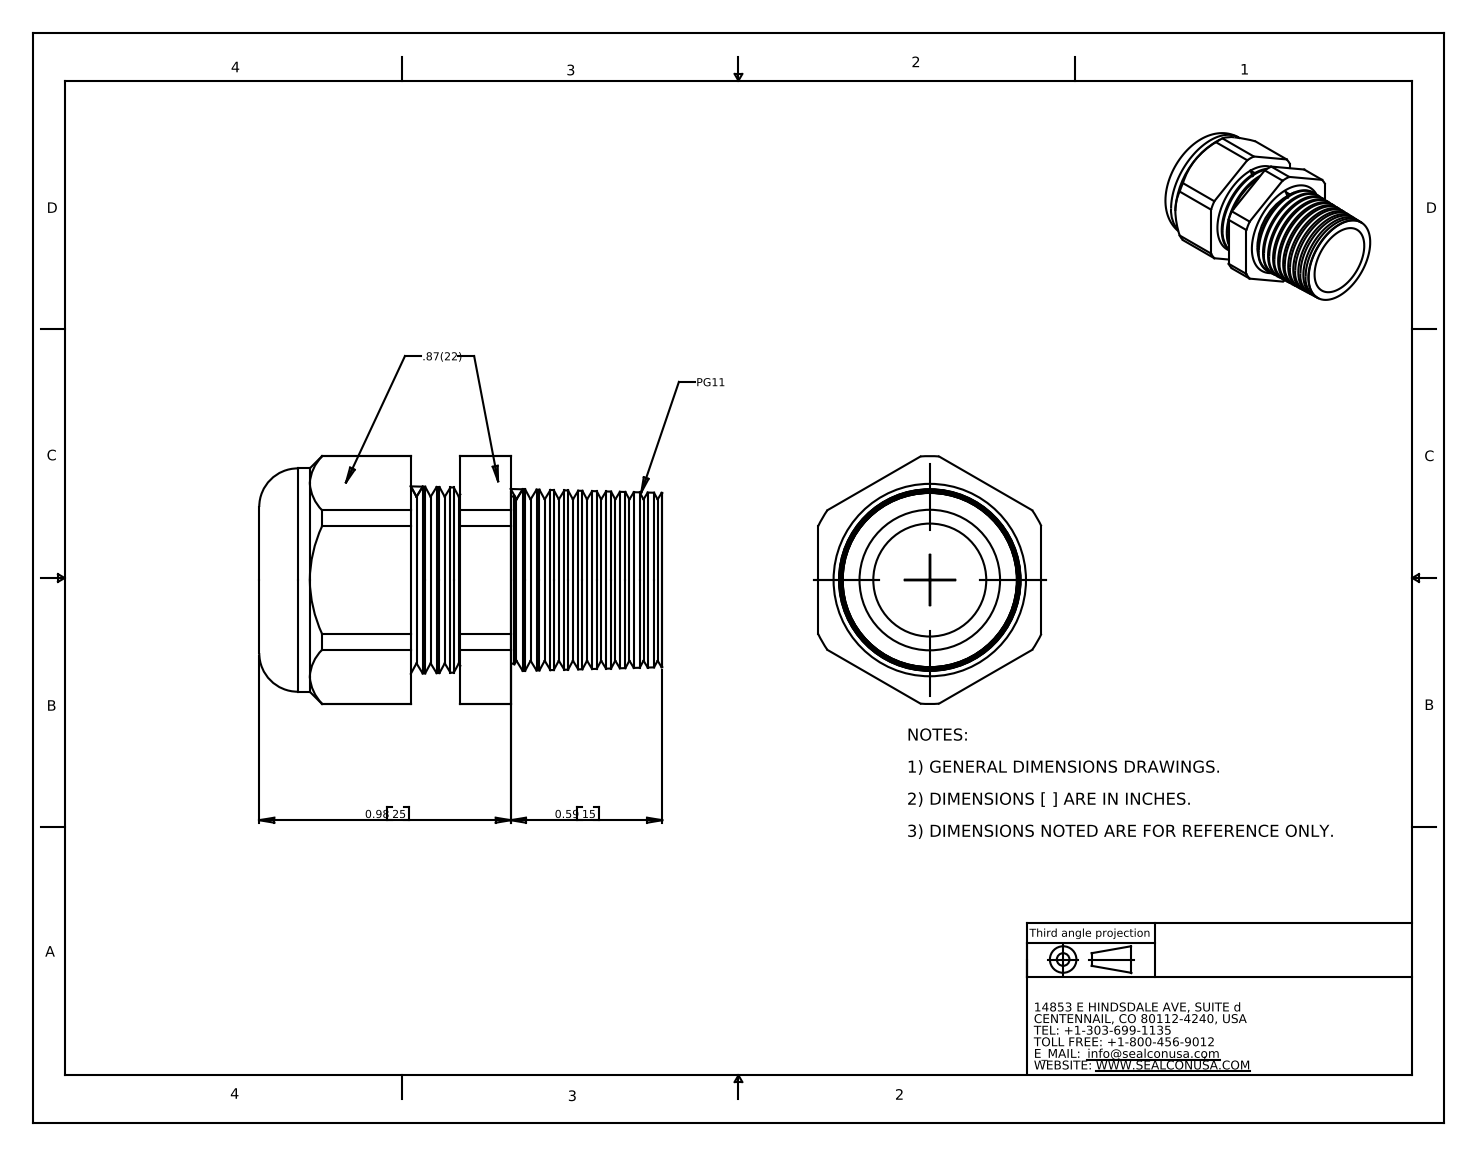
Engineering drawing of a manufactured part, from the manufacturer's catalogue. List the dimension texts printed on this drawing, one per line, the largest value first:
0.98 25
0.59 15
